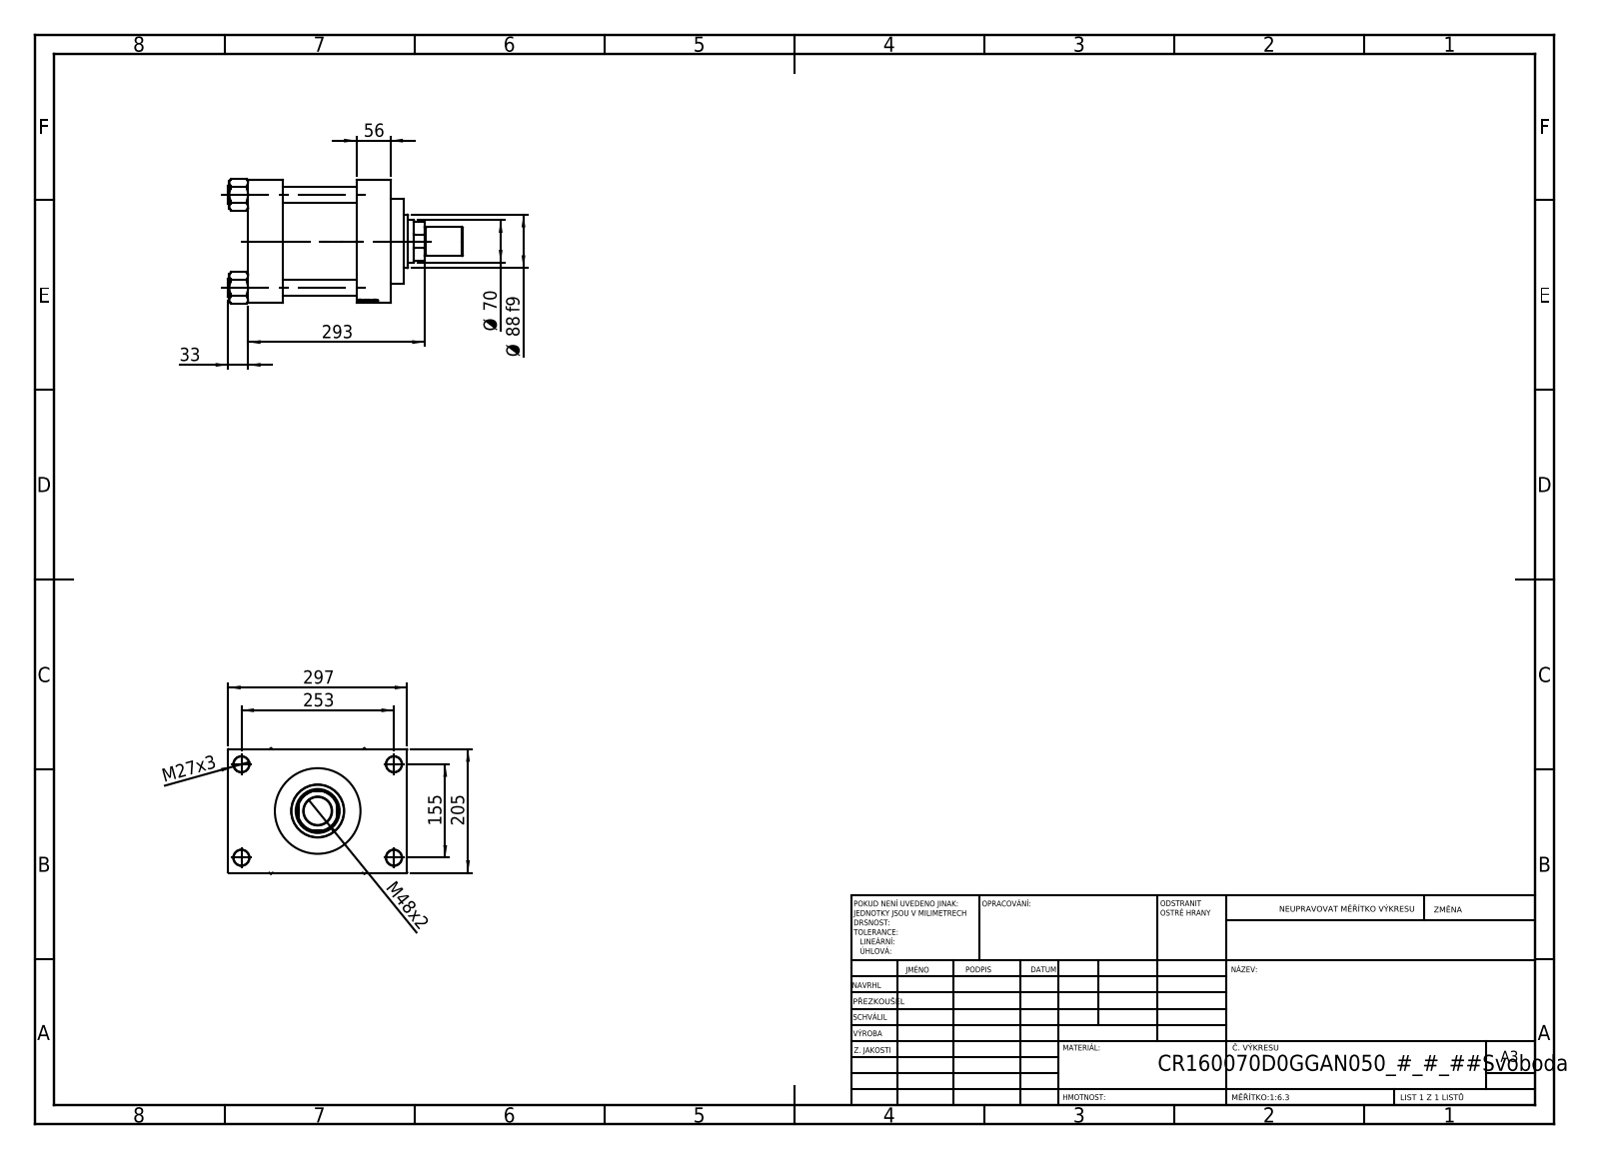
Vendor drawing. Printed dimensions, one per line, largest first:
297
293
253
205
155
Ø 88 f9
Ø 70
56
M48x2
33
M27x3
